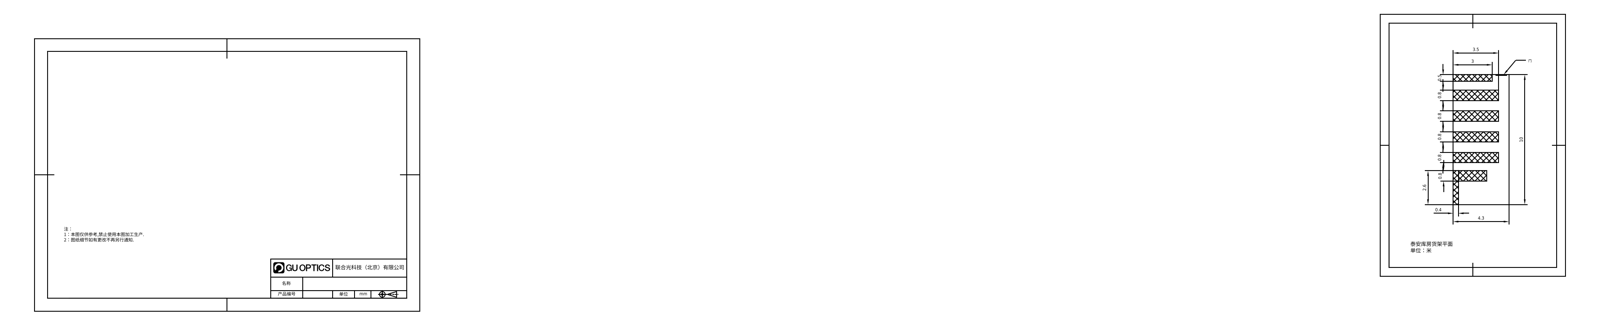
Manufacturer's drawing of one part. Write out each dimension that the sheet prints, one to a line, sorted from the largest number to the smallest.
10
4.3
3.5
3
2.6
0.8
0.8
0.8
0.8
0.8
0.5
0.4
